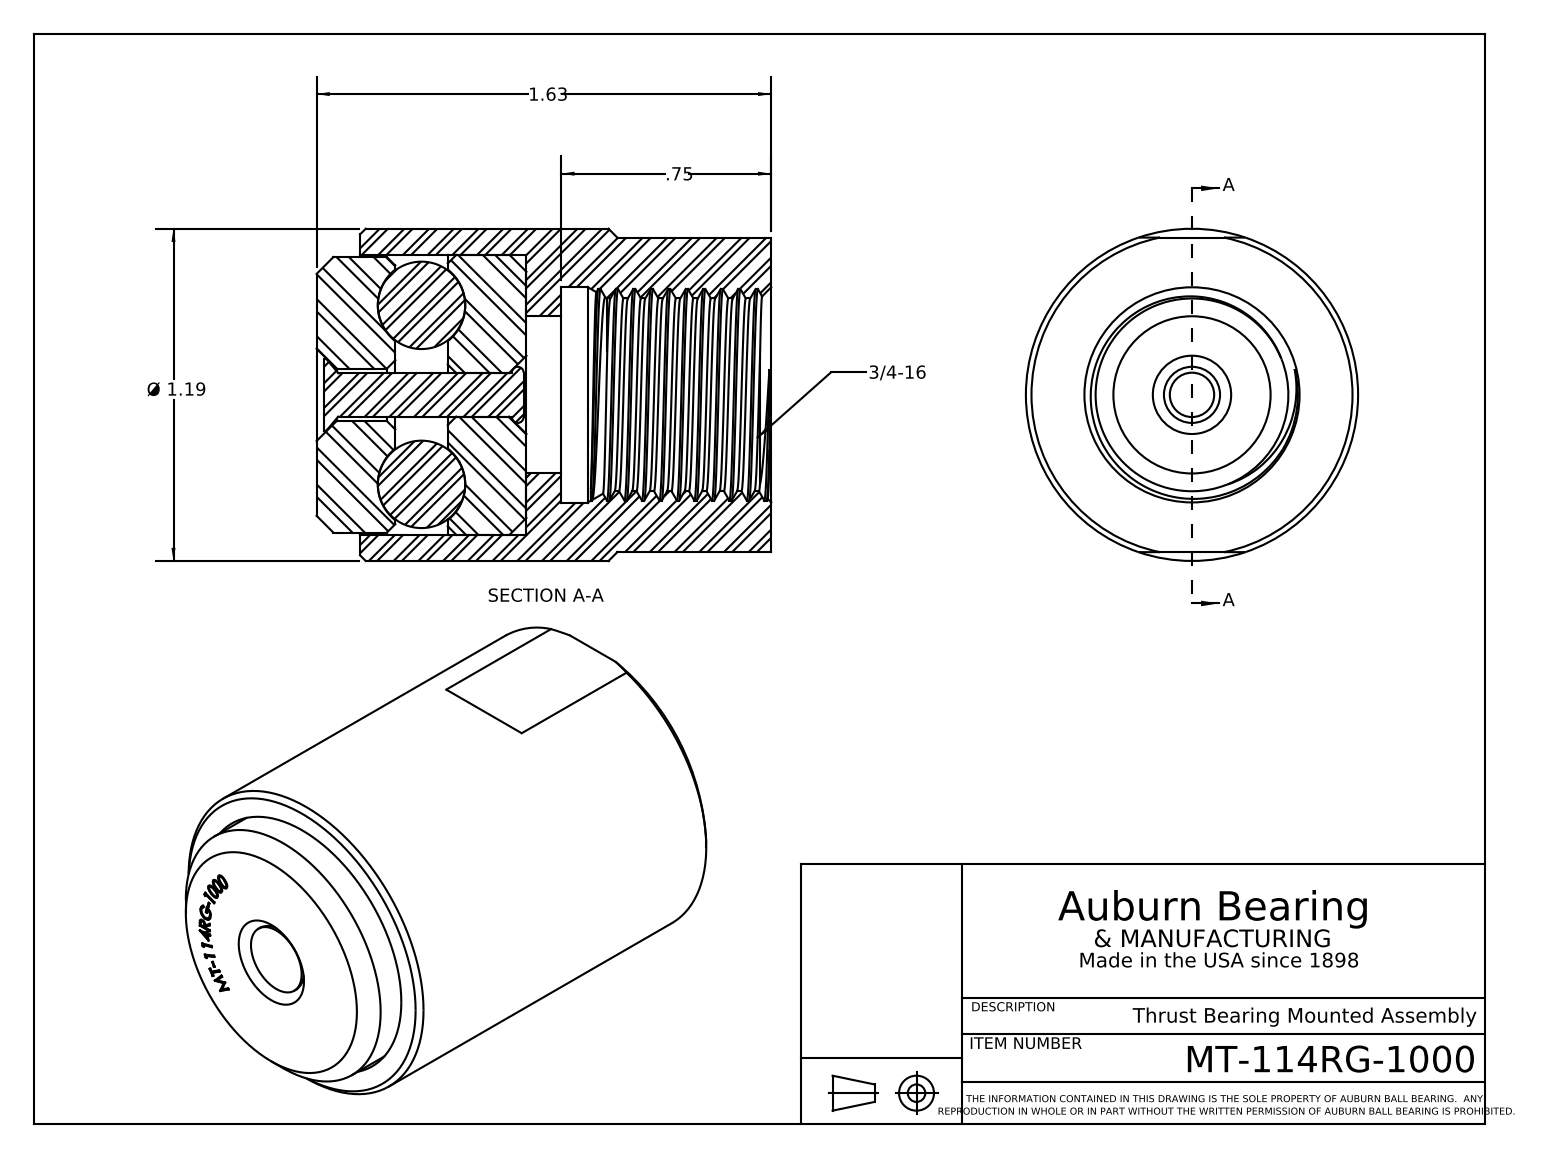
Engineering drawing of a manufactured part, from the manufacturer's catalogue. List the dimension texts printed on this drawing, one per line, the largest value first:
1.63
Ø 1.19
.75
